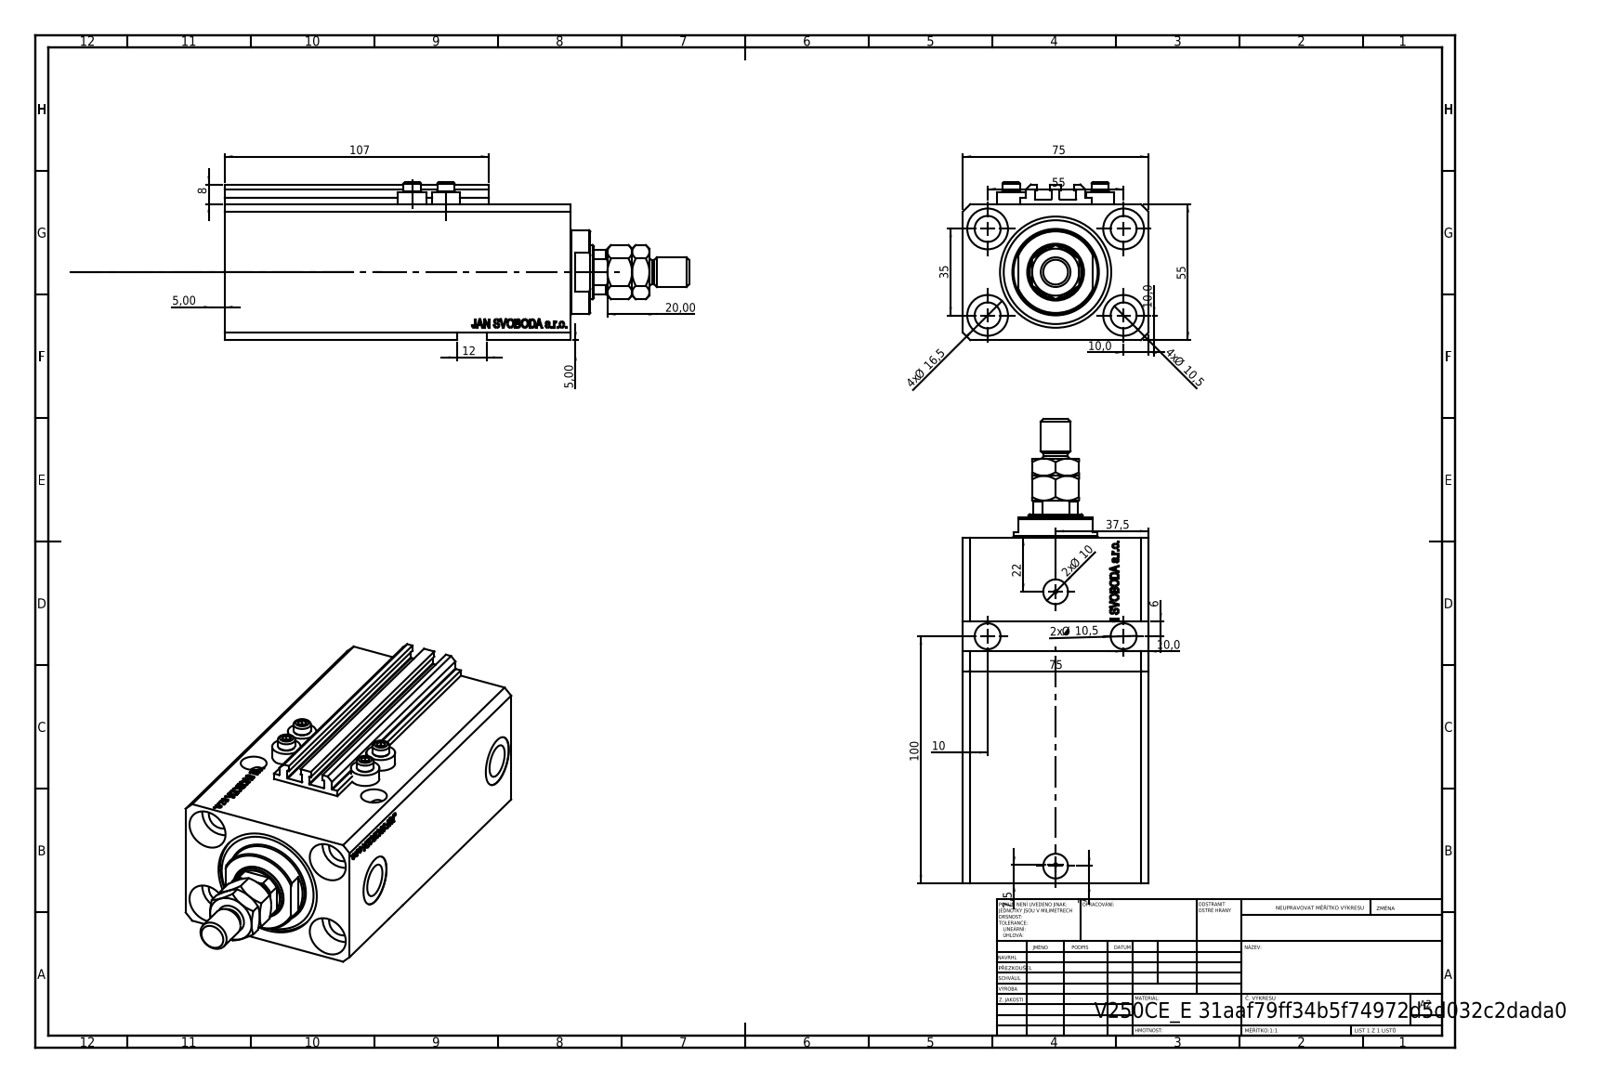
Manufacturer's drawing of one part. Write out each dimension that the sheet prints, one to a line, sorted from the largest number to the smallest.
107
100
75
75
55
55
37,5
35
22
20,00
4x Ø 16,5
12
4x Ø 10,5
2x Ø 10,5
10,0
10,0
2x Ø 10
10,0
10
8
7,5
7
6
5,00
5,00
